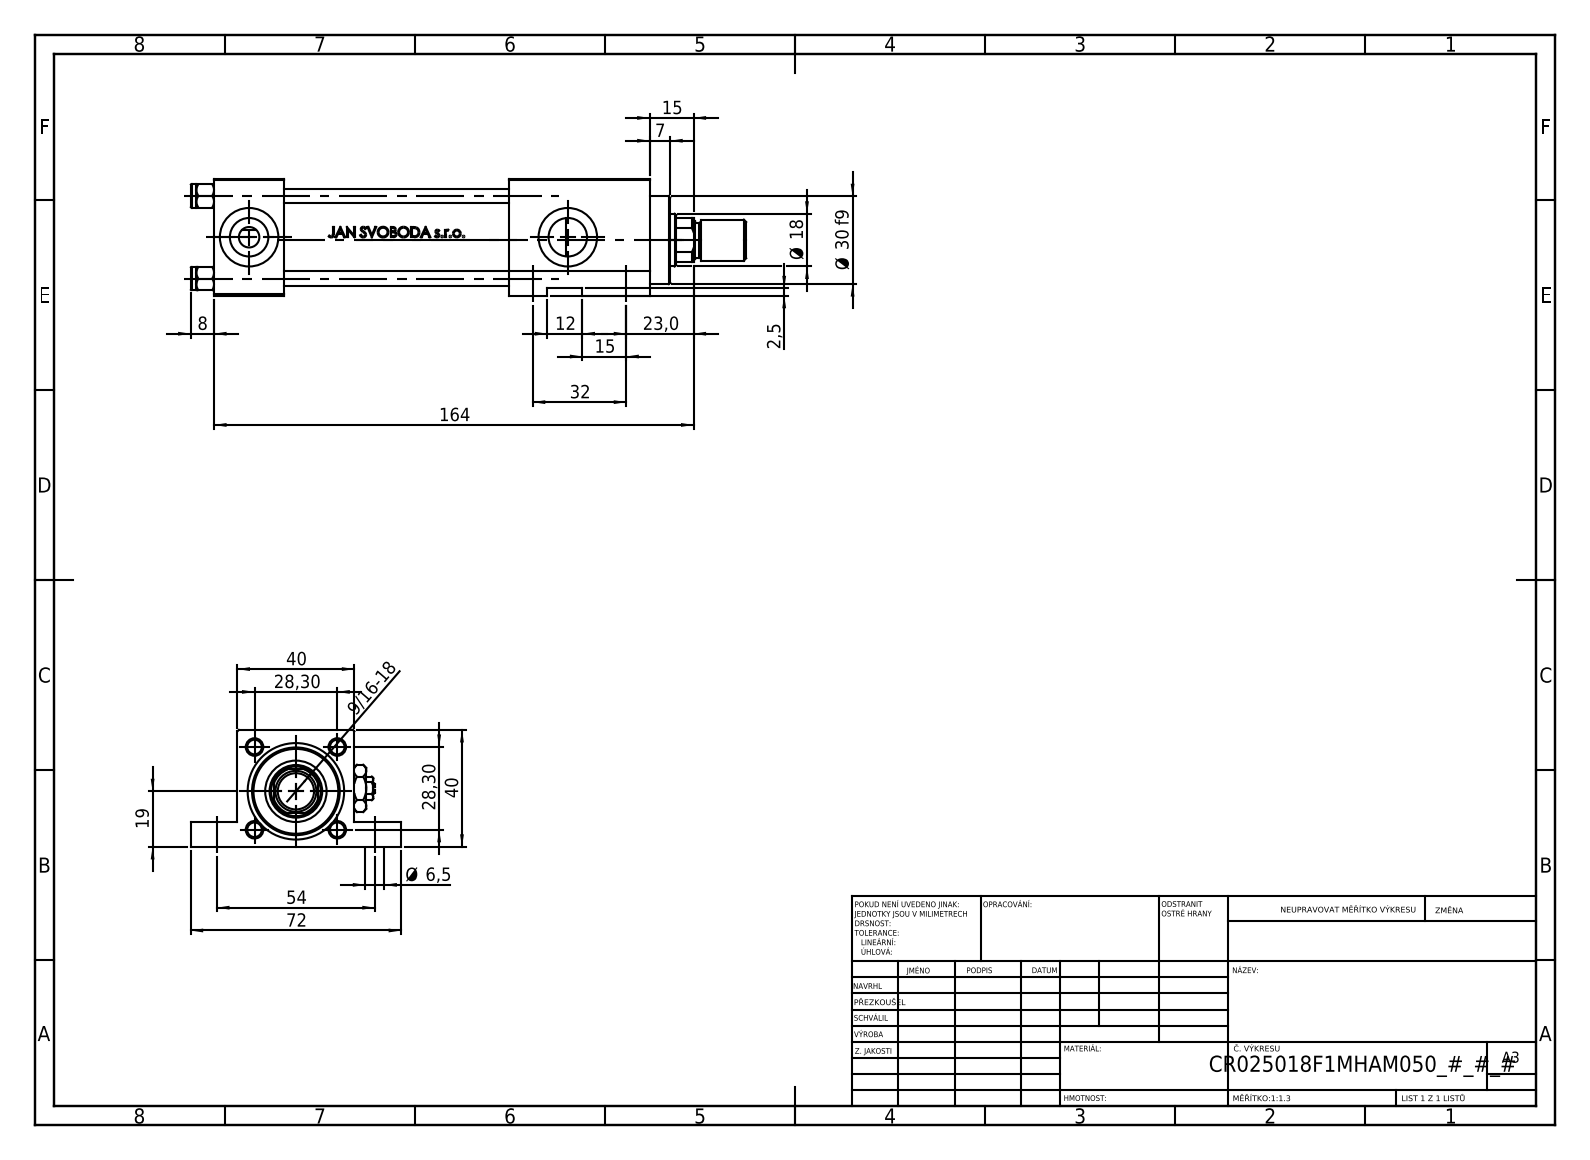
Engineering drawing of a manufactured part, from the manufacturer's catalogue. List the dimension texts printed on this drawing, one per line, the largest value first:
164
72
54
40
40
32
Ø 30 f9
28,30
28,30
23,0
19
Ø 18
15
15
12
8
7
Ø 6,5
2,5
9/16-18
